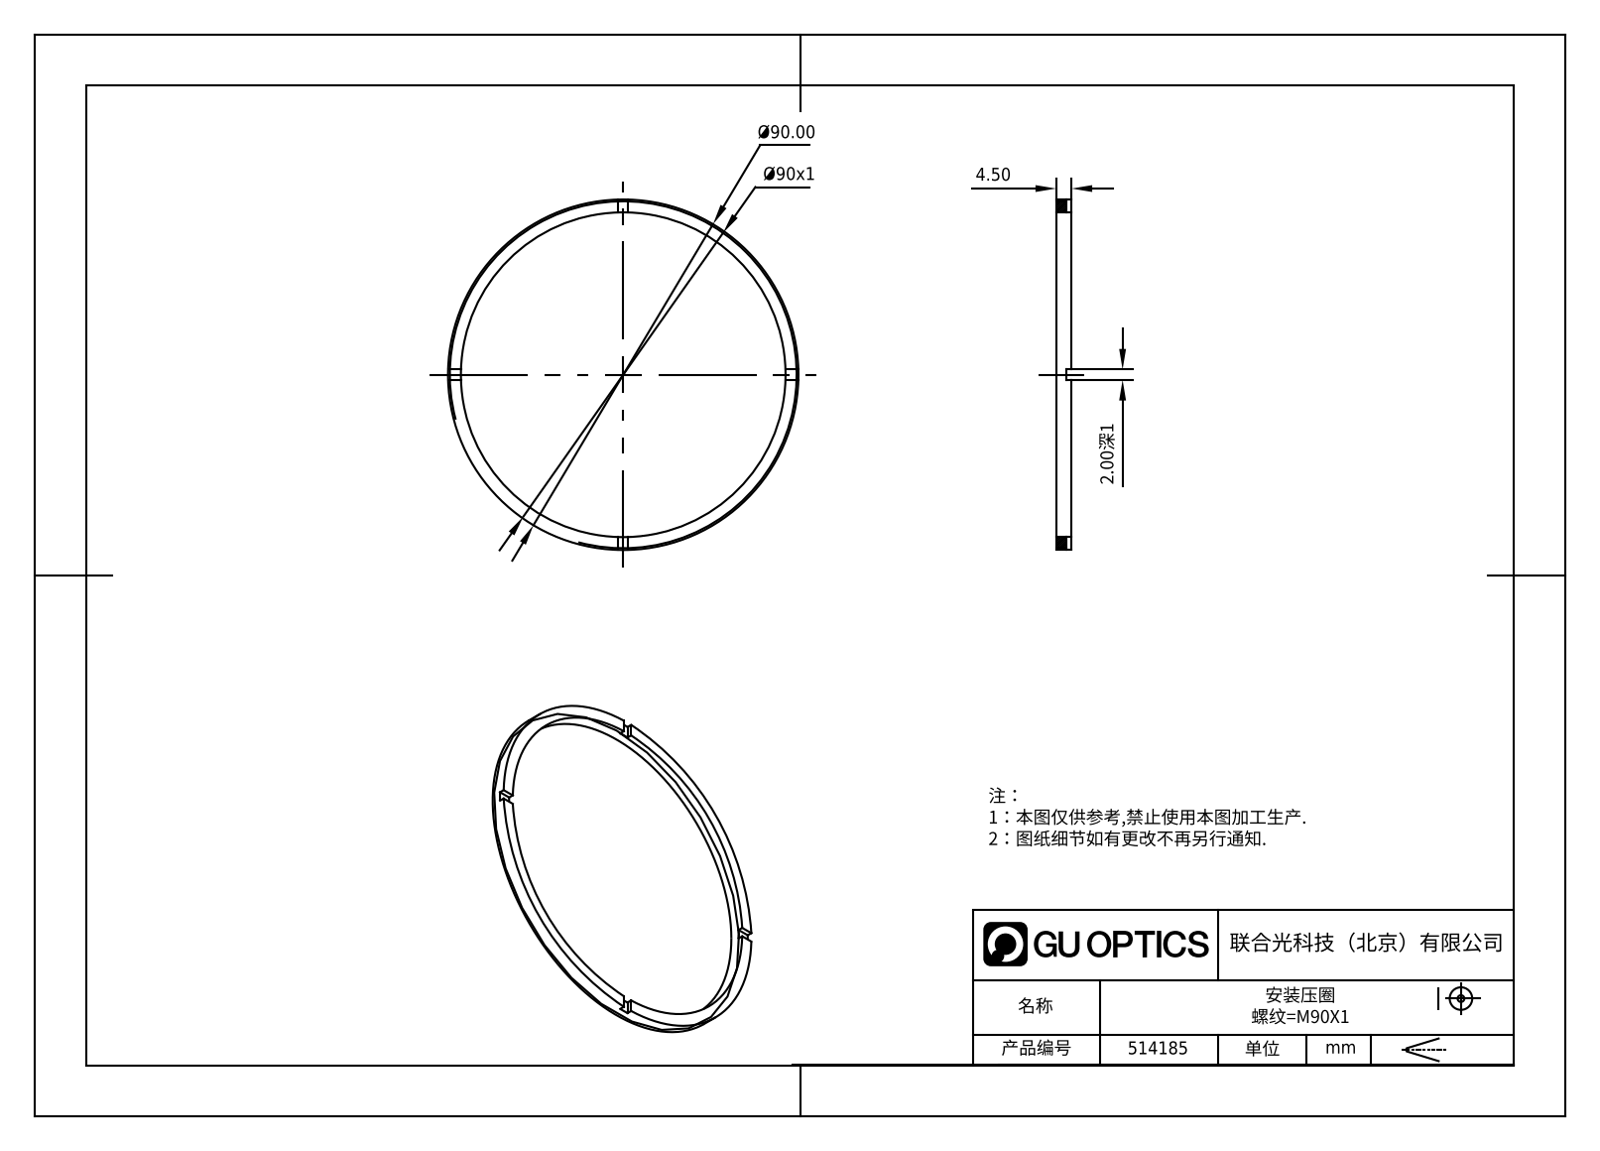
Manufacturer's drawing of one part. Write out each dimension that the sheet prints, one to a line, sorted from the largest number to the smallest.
Ø90.00
Ø90x1
4.50
2.00深1
